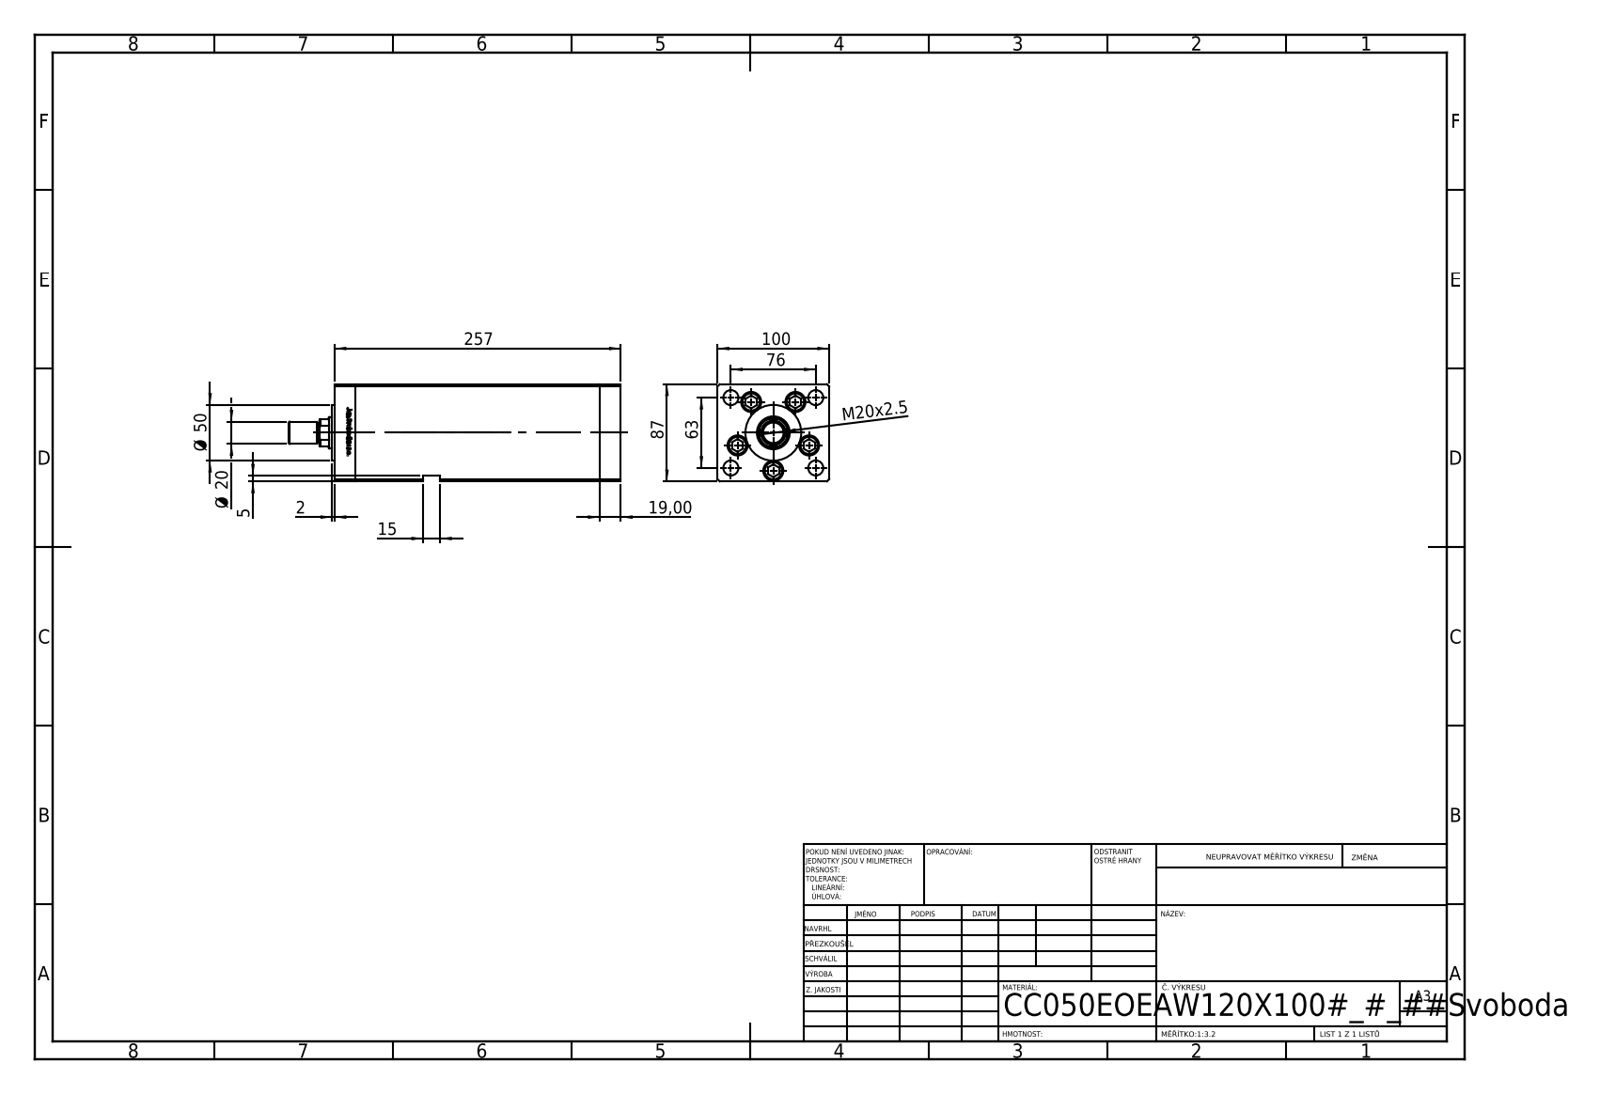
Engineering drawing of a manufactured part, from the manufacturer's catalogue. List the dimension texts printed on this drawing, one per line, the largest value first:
257
100
87
76
63
Ø 50
Ø 20
M20x2.5
19,00
15
5
2
